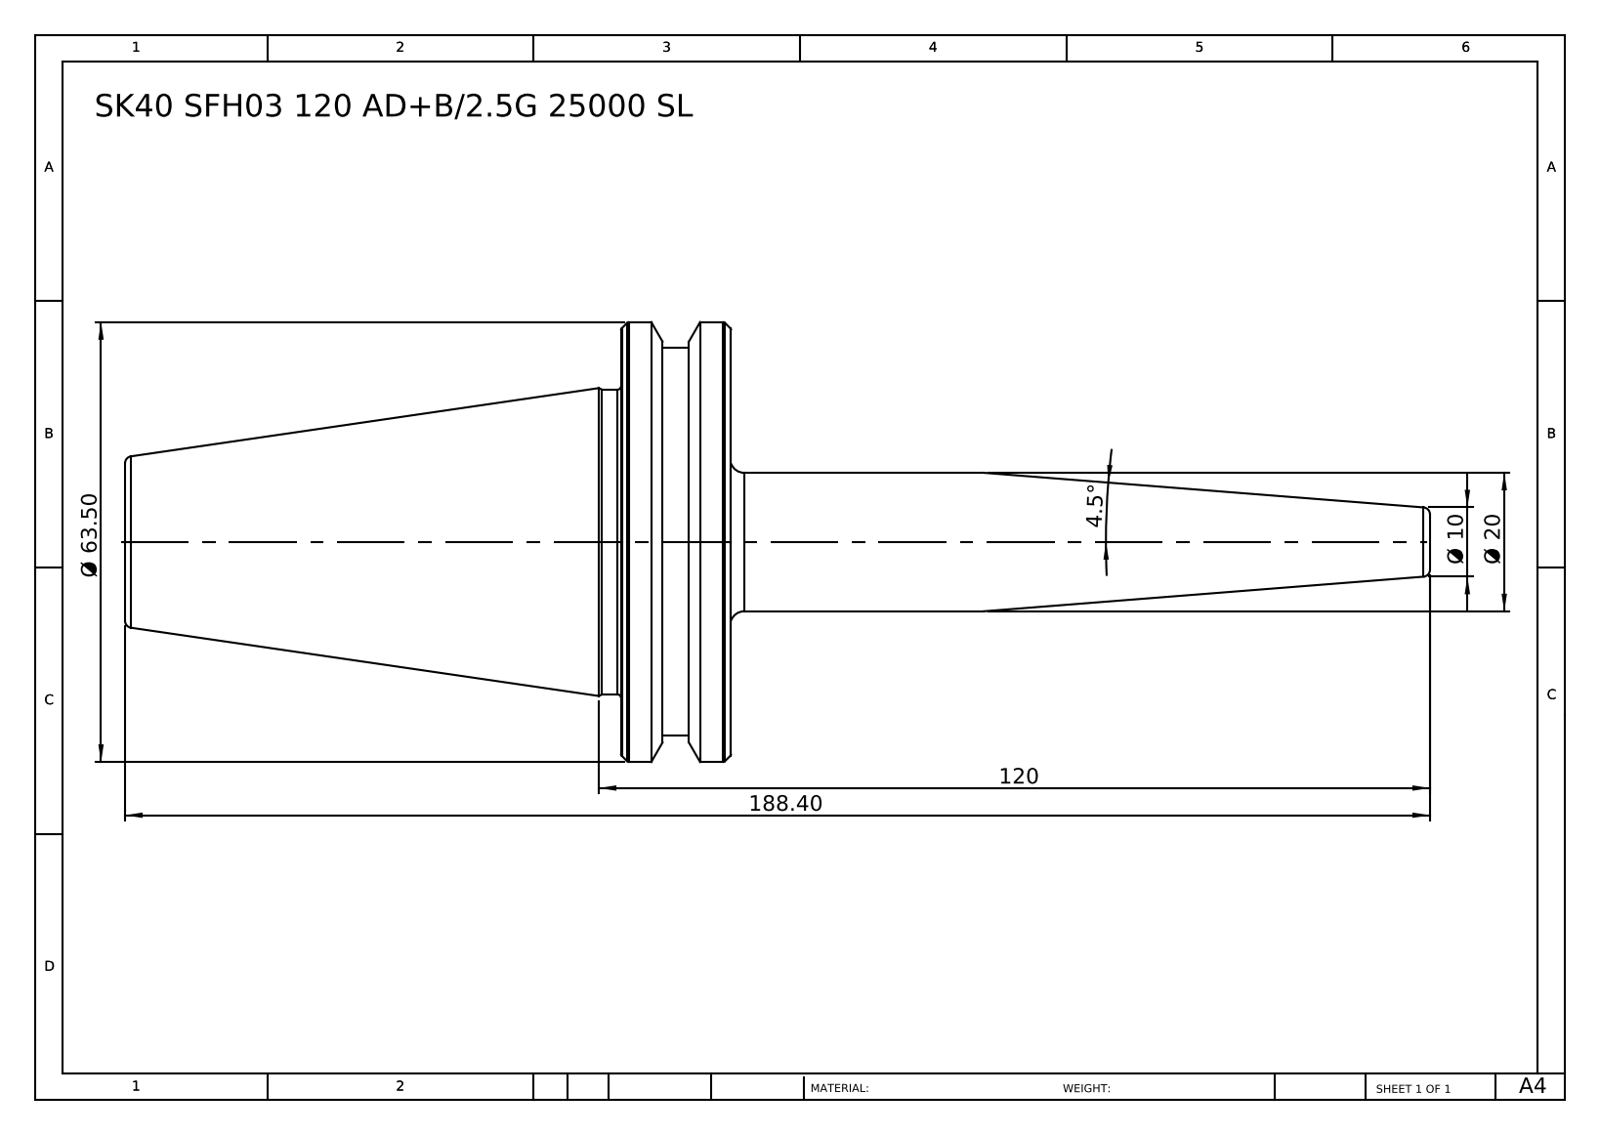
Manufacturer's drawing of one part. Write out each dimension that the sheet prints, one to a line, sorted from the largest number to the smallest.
188.40
120
Ø 63.50
Ø 20
Ø 10
4.5°
